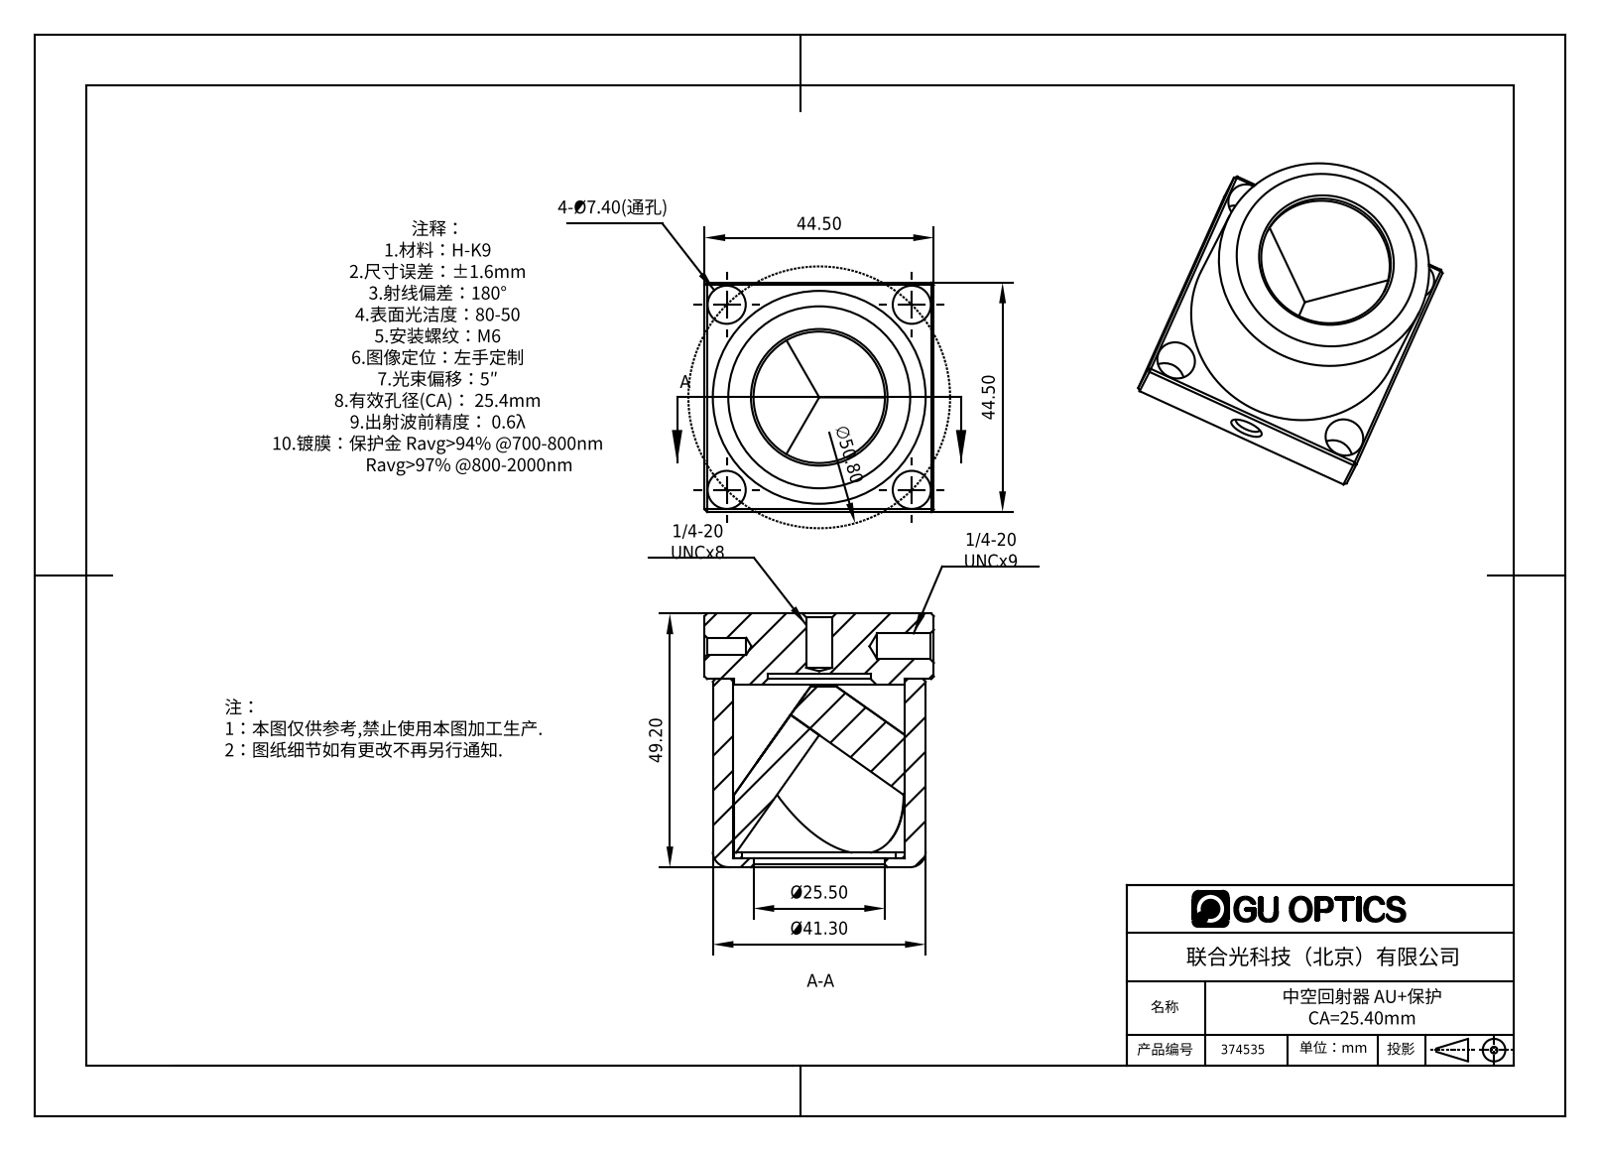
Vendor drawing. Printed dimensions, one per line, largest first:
∅50.80
49.20
44.50
44.50
Ø41.30
Ø25.50
